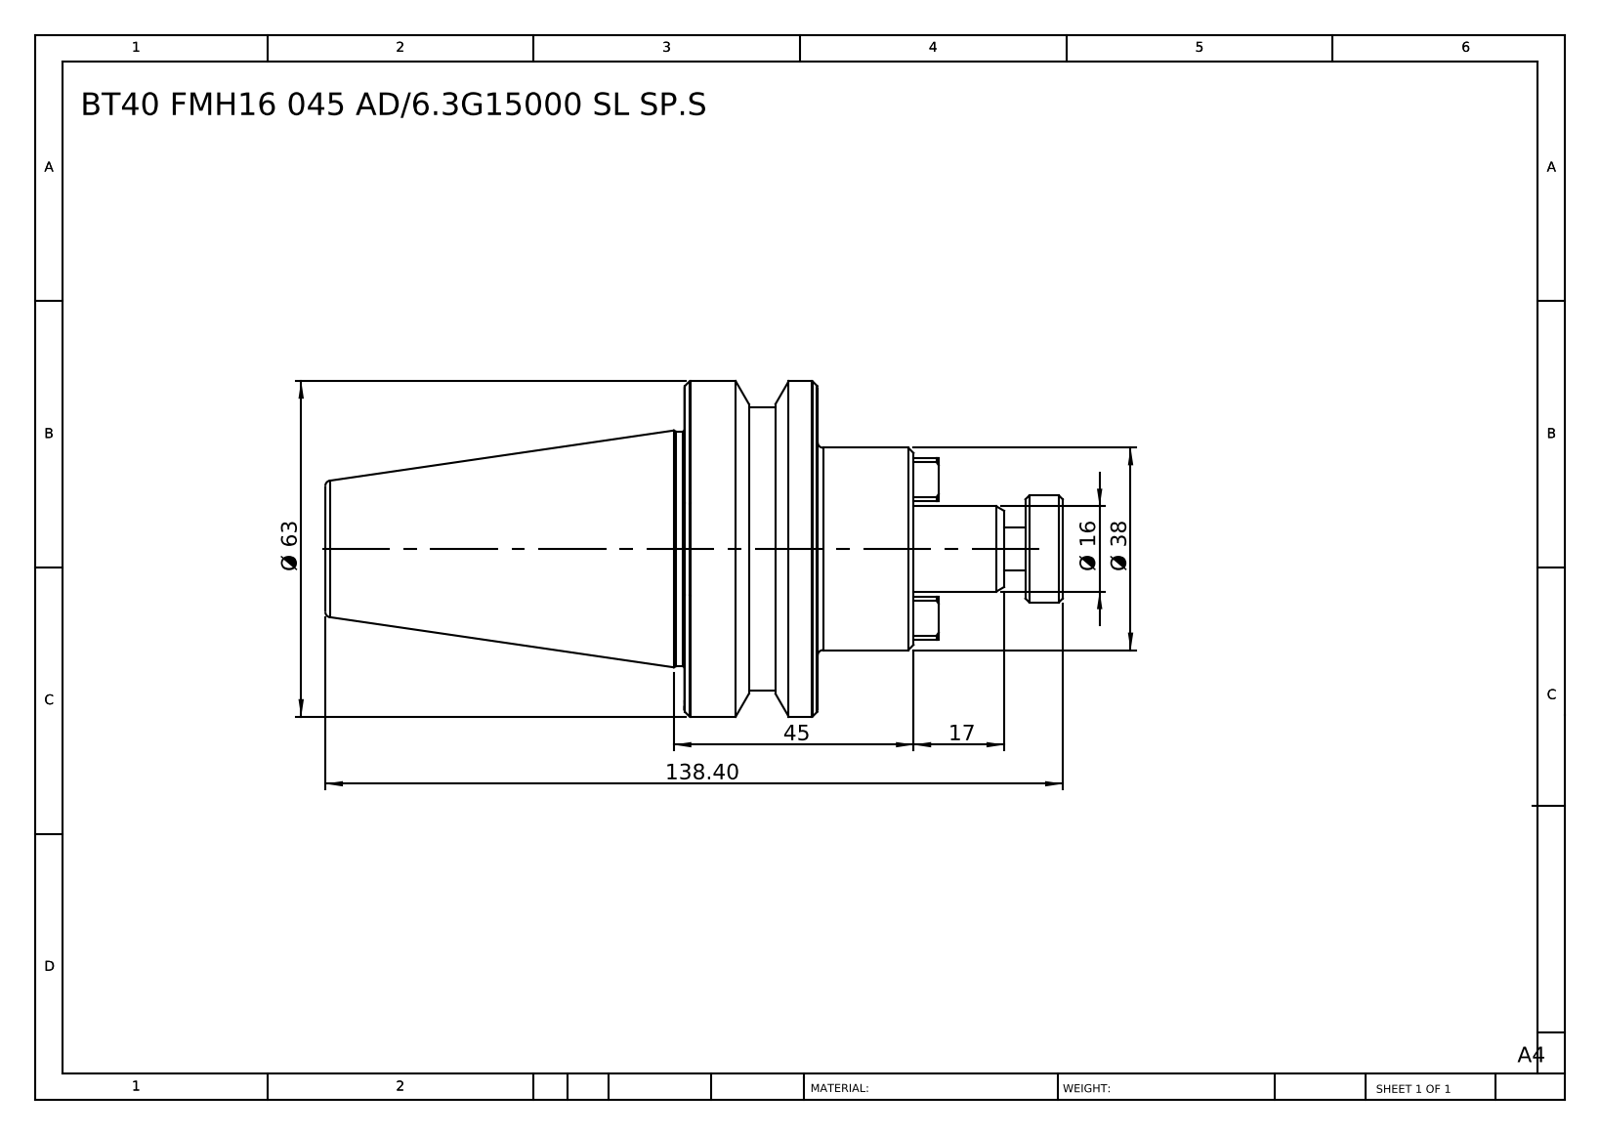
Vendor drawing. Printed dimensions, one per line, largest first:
138.40
Ø 63
45
Ø 38
17
Ø 16
